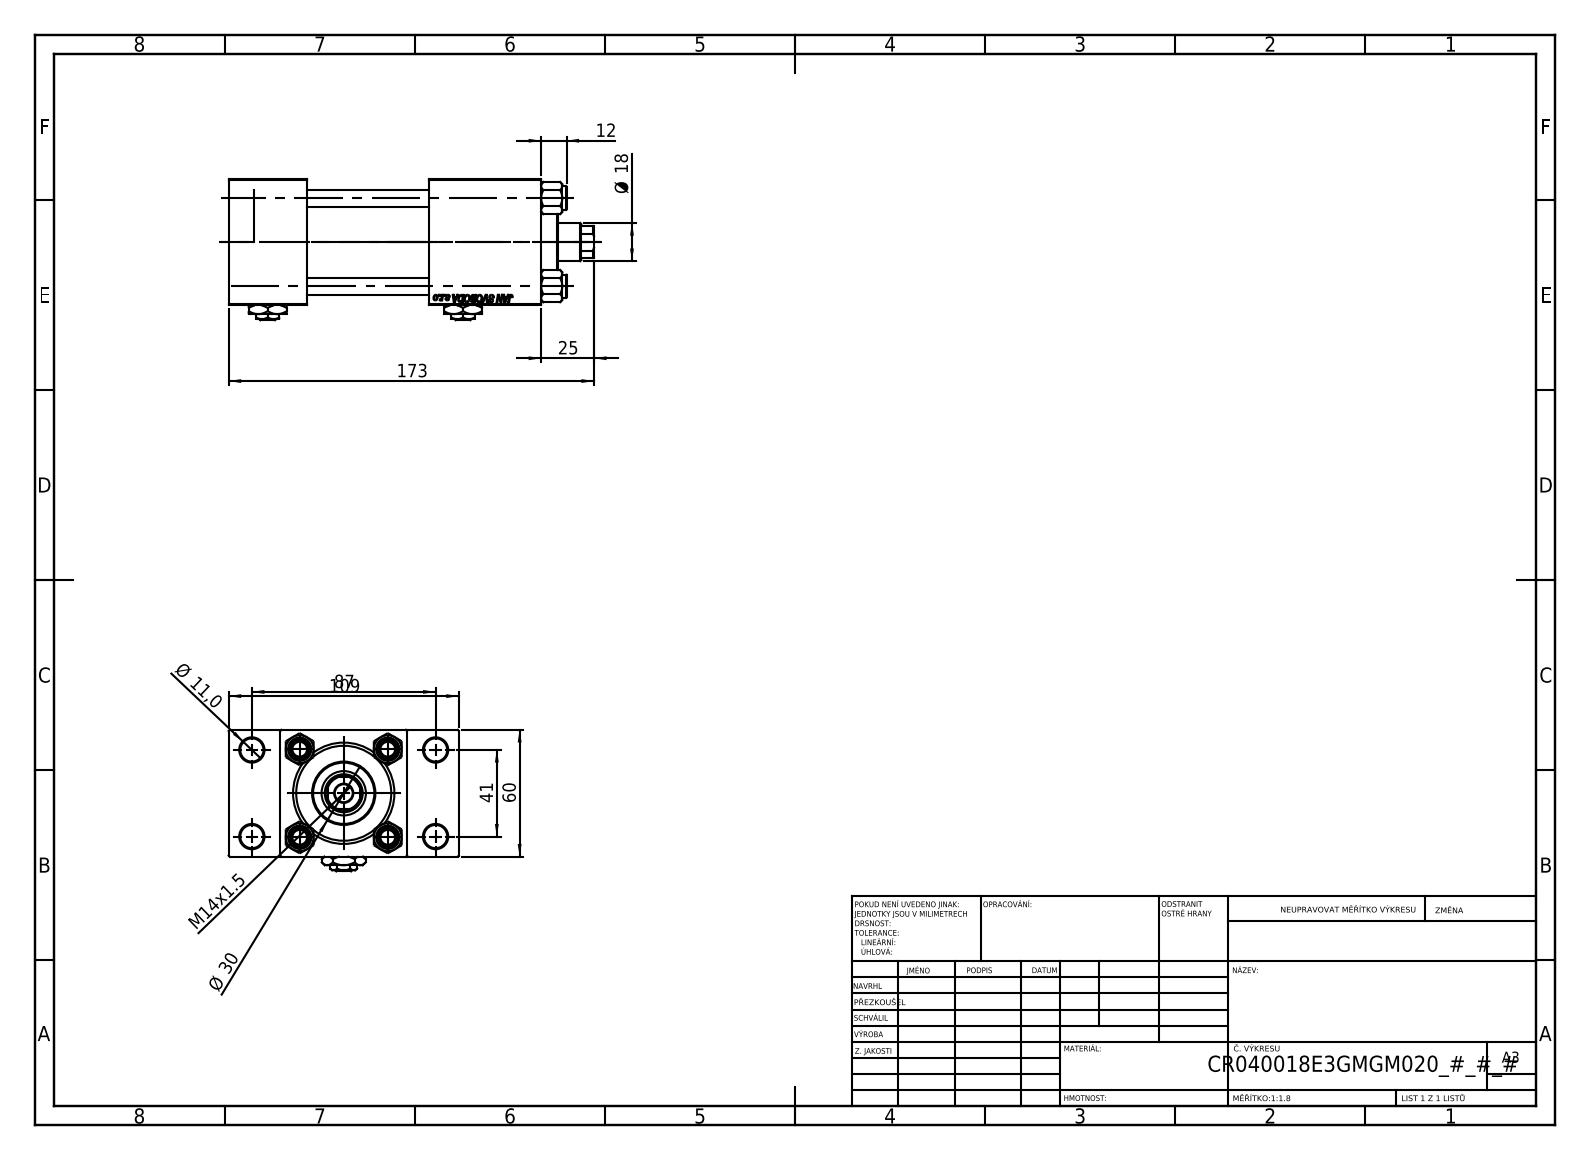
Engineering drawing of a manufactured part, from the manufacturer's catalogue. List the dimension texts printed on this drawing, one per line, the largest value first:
173
109
87
60
41
Ø 30
25
Ø 18
M14x1.5
12
Ø 11,0
